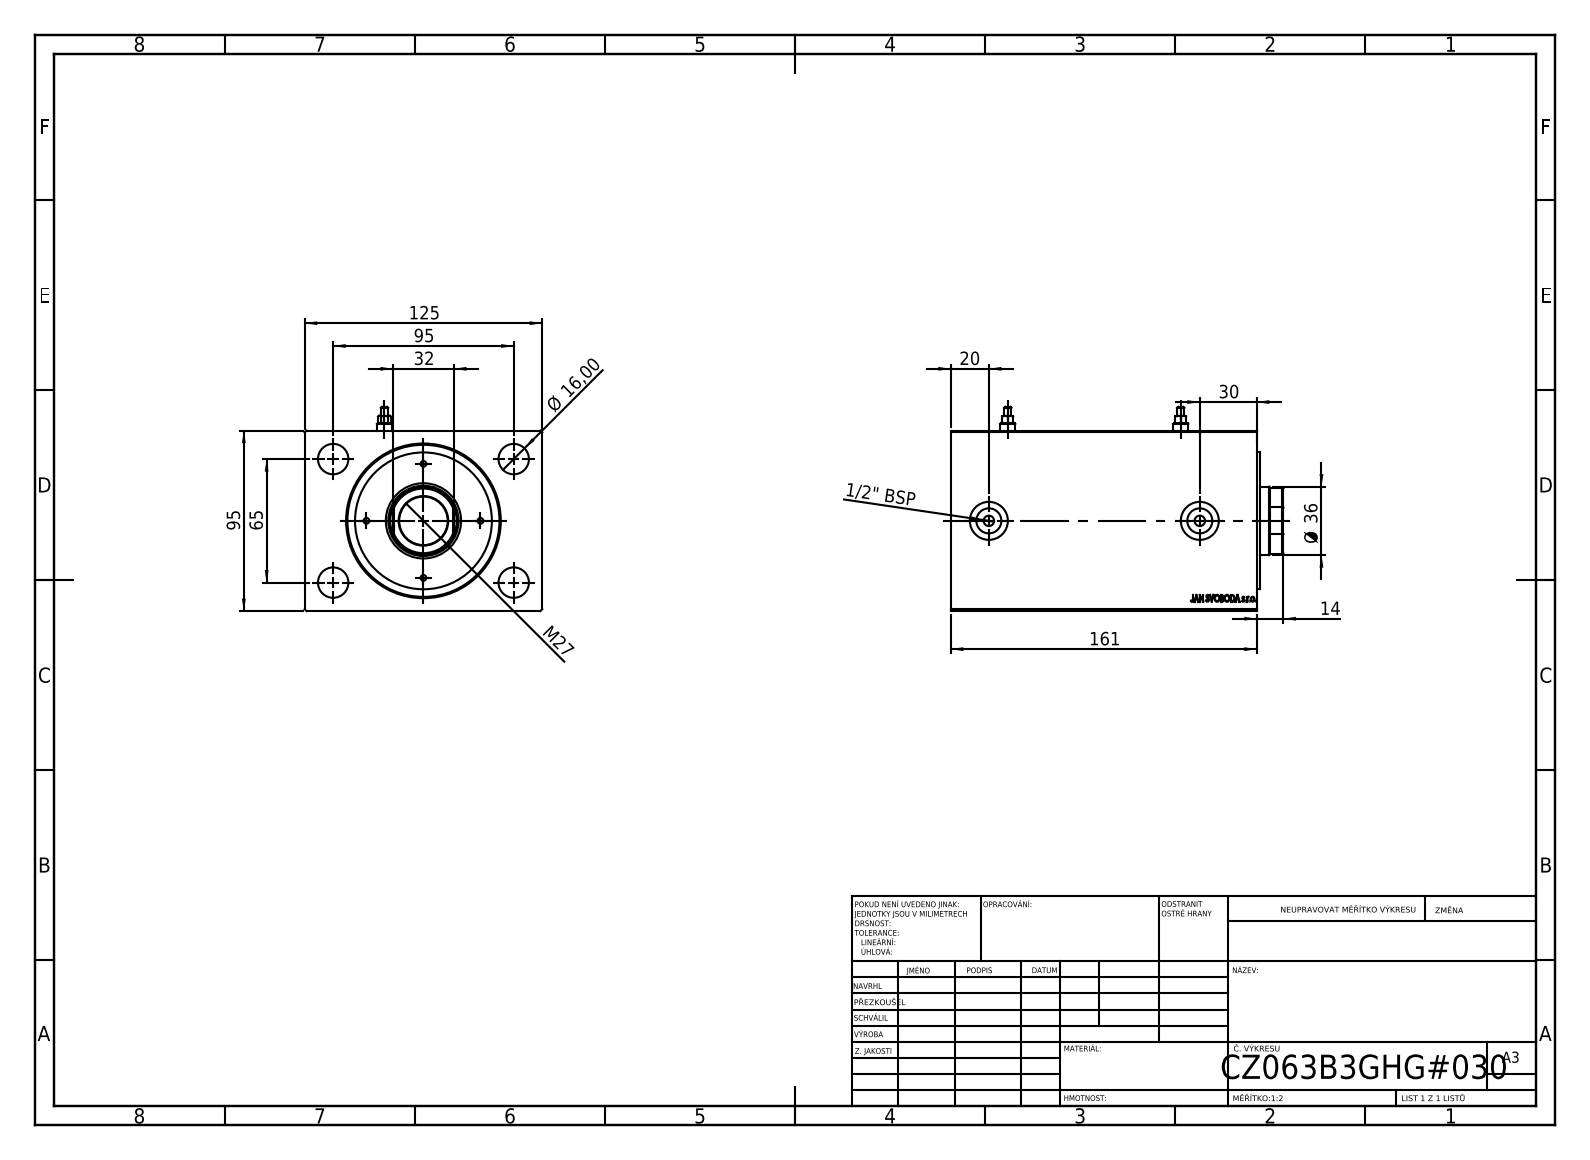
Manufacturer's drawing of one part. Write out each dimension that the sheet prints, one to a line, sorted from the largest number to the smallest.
161
125
95
95
65
Ø 36
32
30
M27
20
Ø 16,00
14
1/2" BSP
